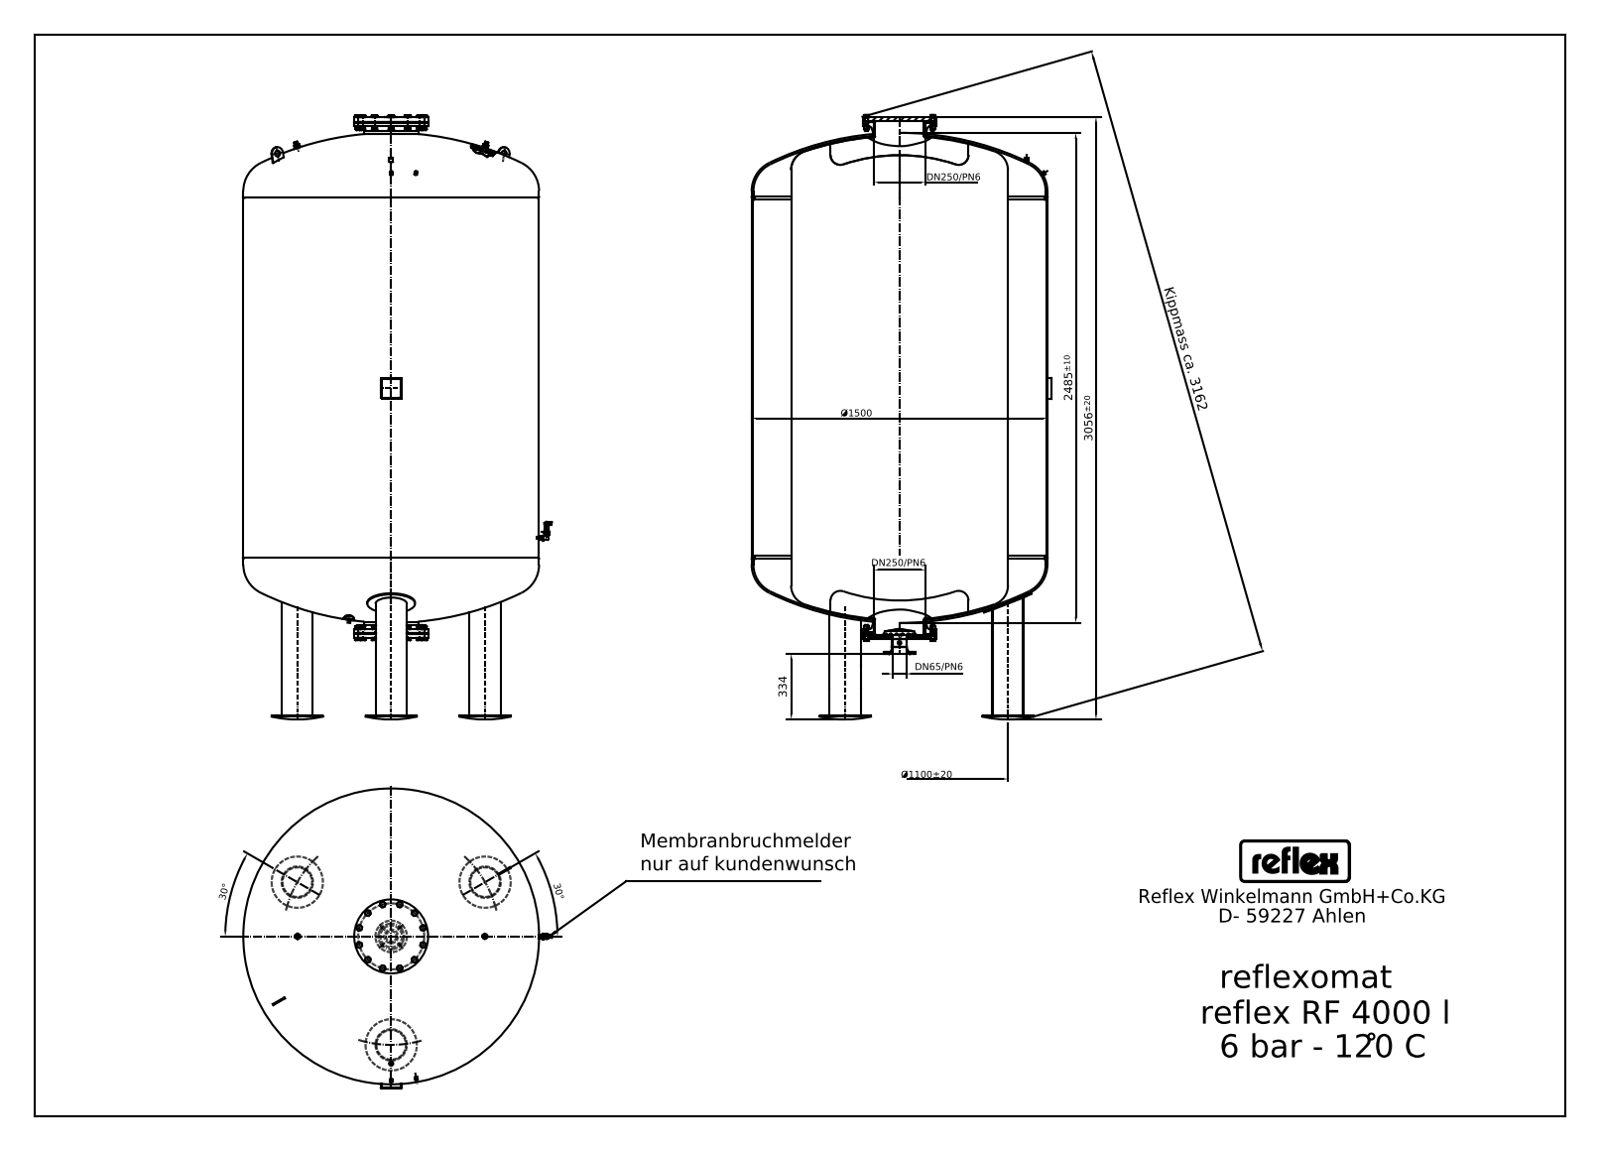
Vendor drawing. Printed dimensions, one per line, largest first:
Kippmass ca. 3162
3056±20
2485±10
Ø1500
Ø1100±20
334
DN250/PN6
DN250/PN6
DN65/PN6
30°
30°
